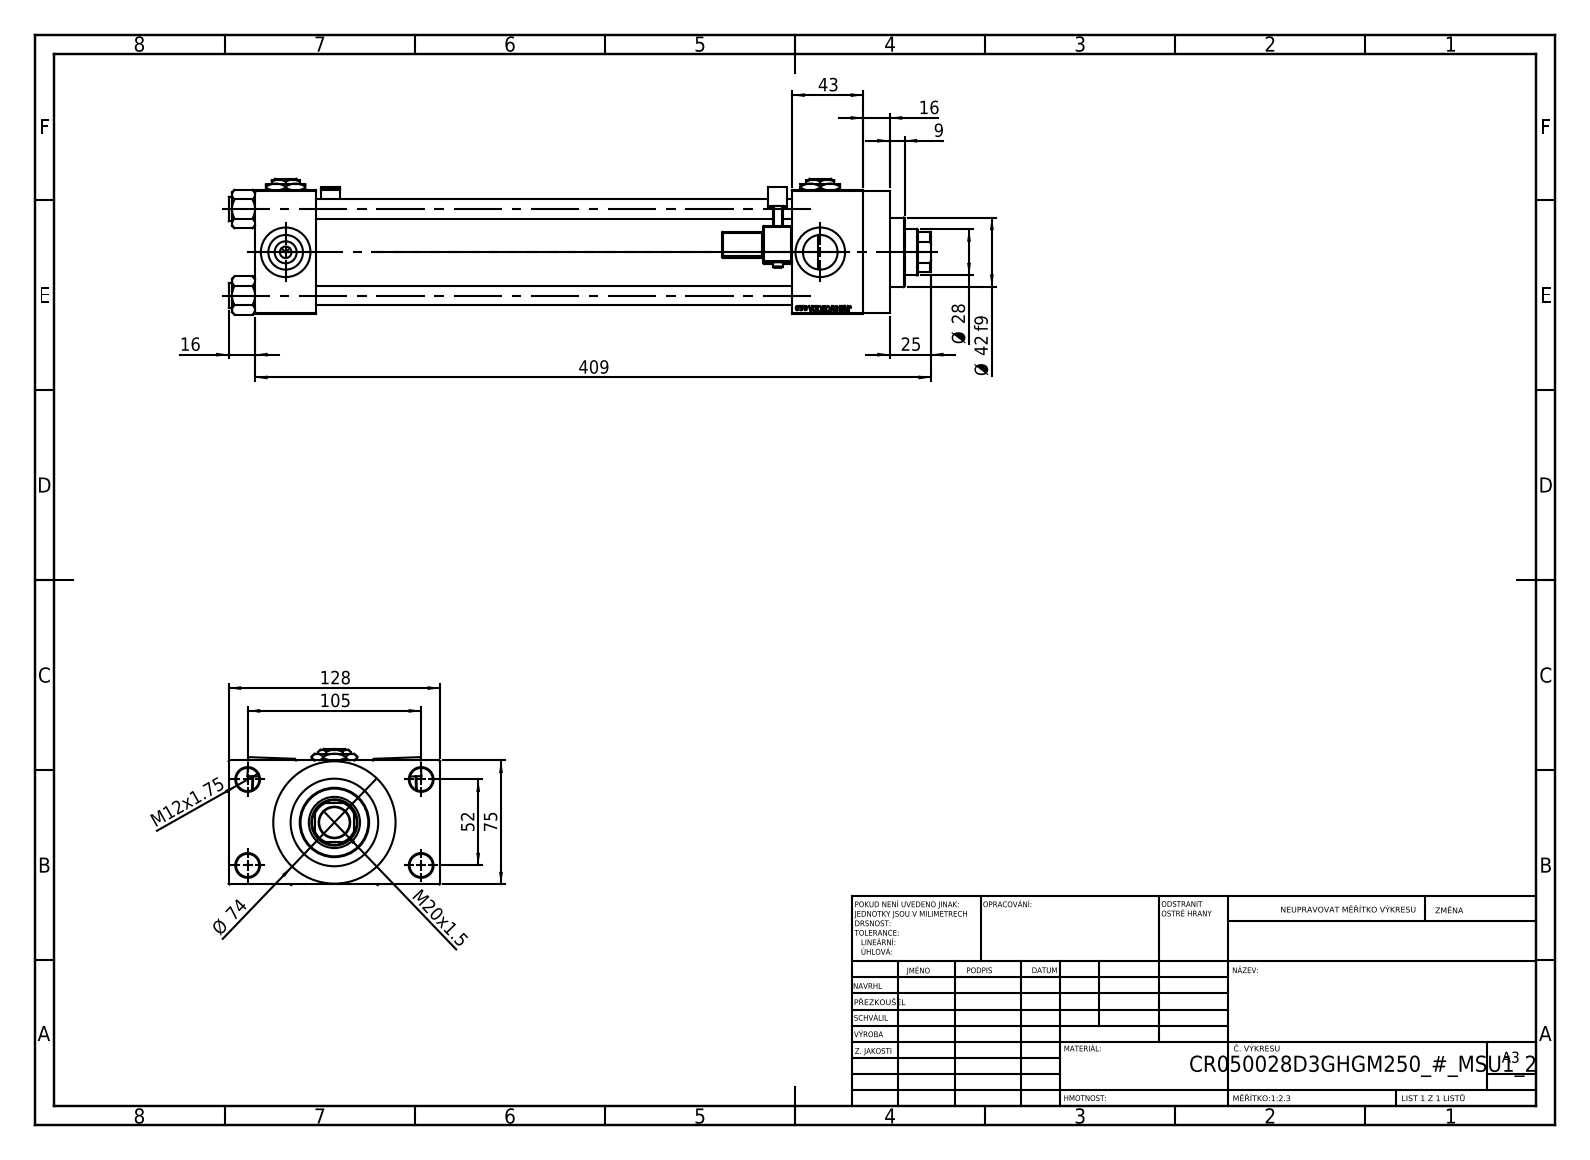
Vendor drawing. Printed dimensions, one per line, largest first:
409
128
105
75
Ø 74
52
43
Ø 42 f9
Ø 28
25
M20x1.5
16
16
M12x1.75
9
